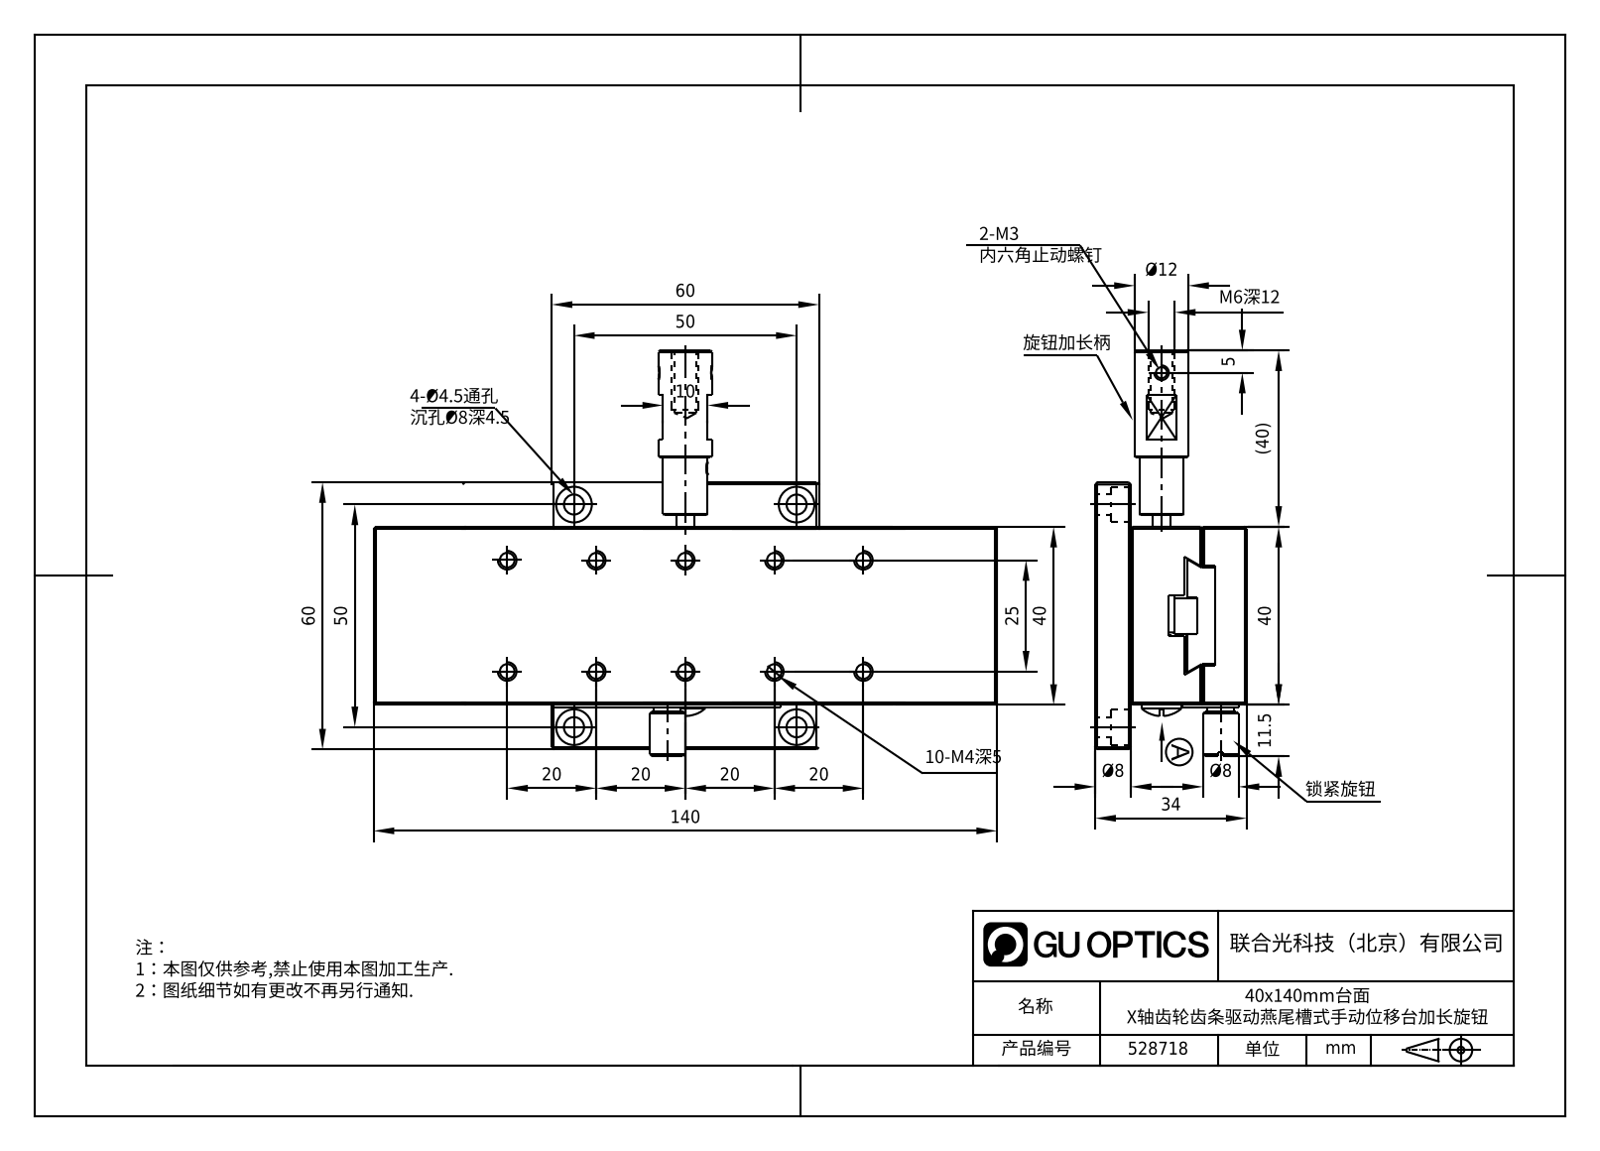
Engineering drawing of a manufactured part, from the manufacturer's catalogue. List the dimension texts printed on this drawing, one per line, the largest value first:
140
60
60
50
50
40
(40)
40
34
25
20
20
20
20
Ø12
11.5
10
Ø8
Ø8
M6深12
5
